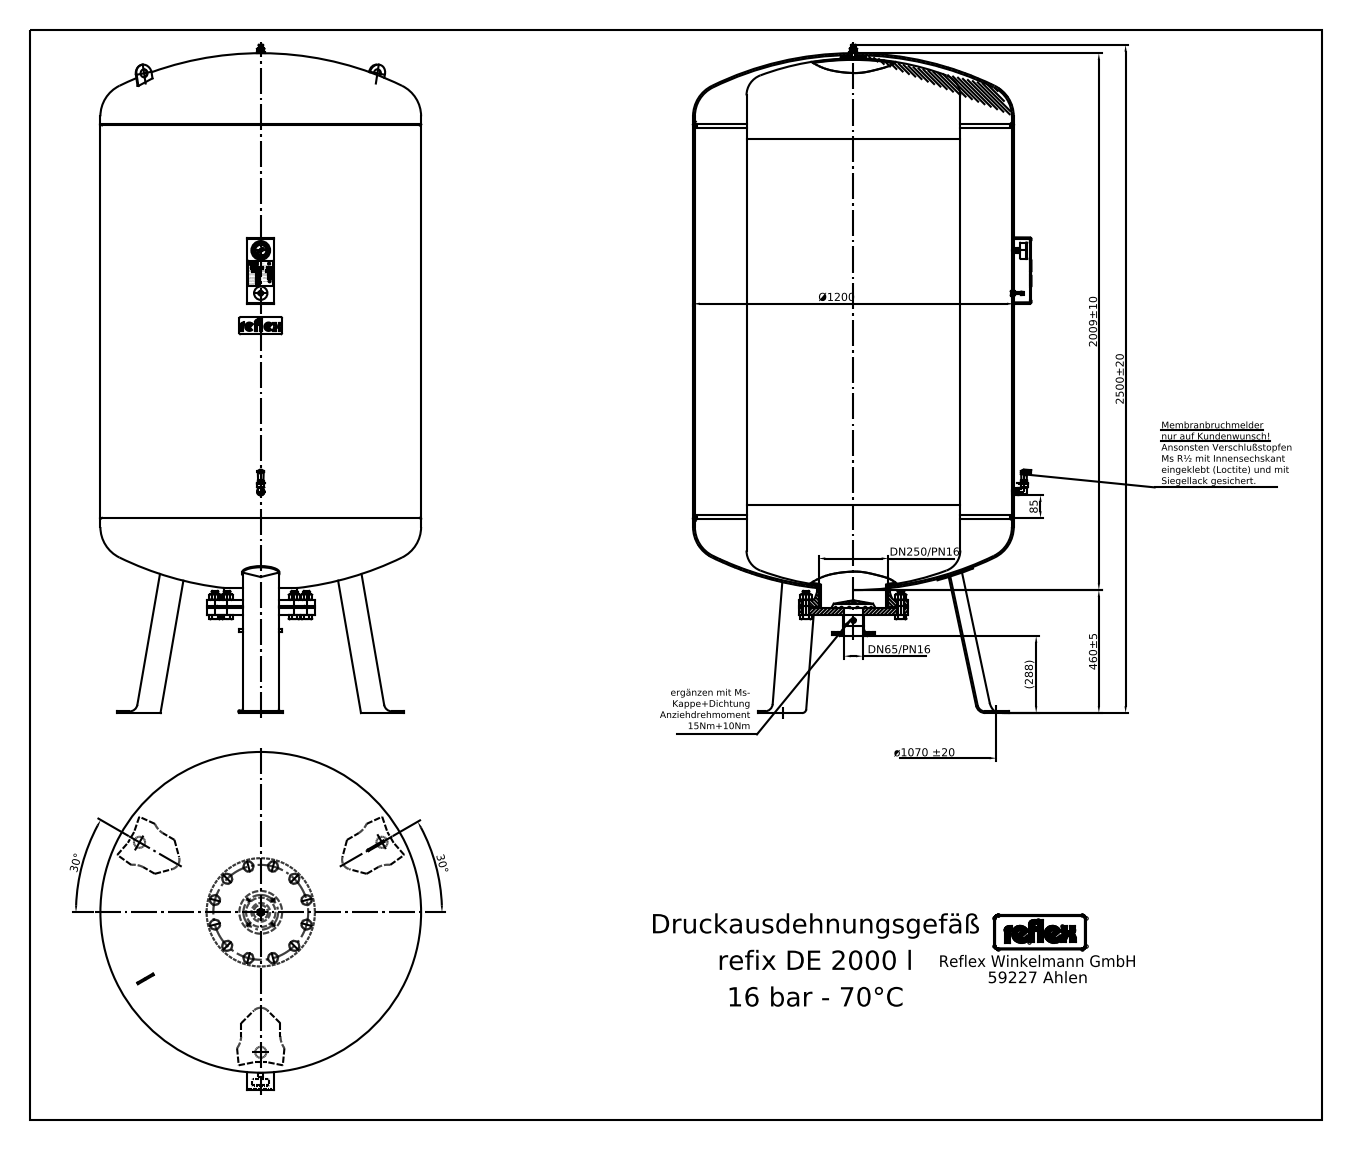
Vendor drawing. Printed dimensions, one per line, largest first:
2500±20
2009±10
Ø1200
ø1070 ±20
460±5
(288)
DN250/PN16
85
DN65/PN16
30°
30°
